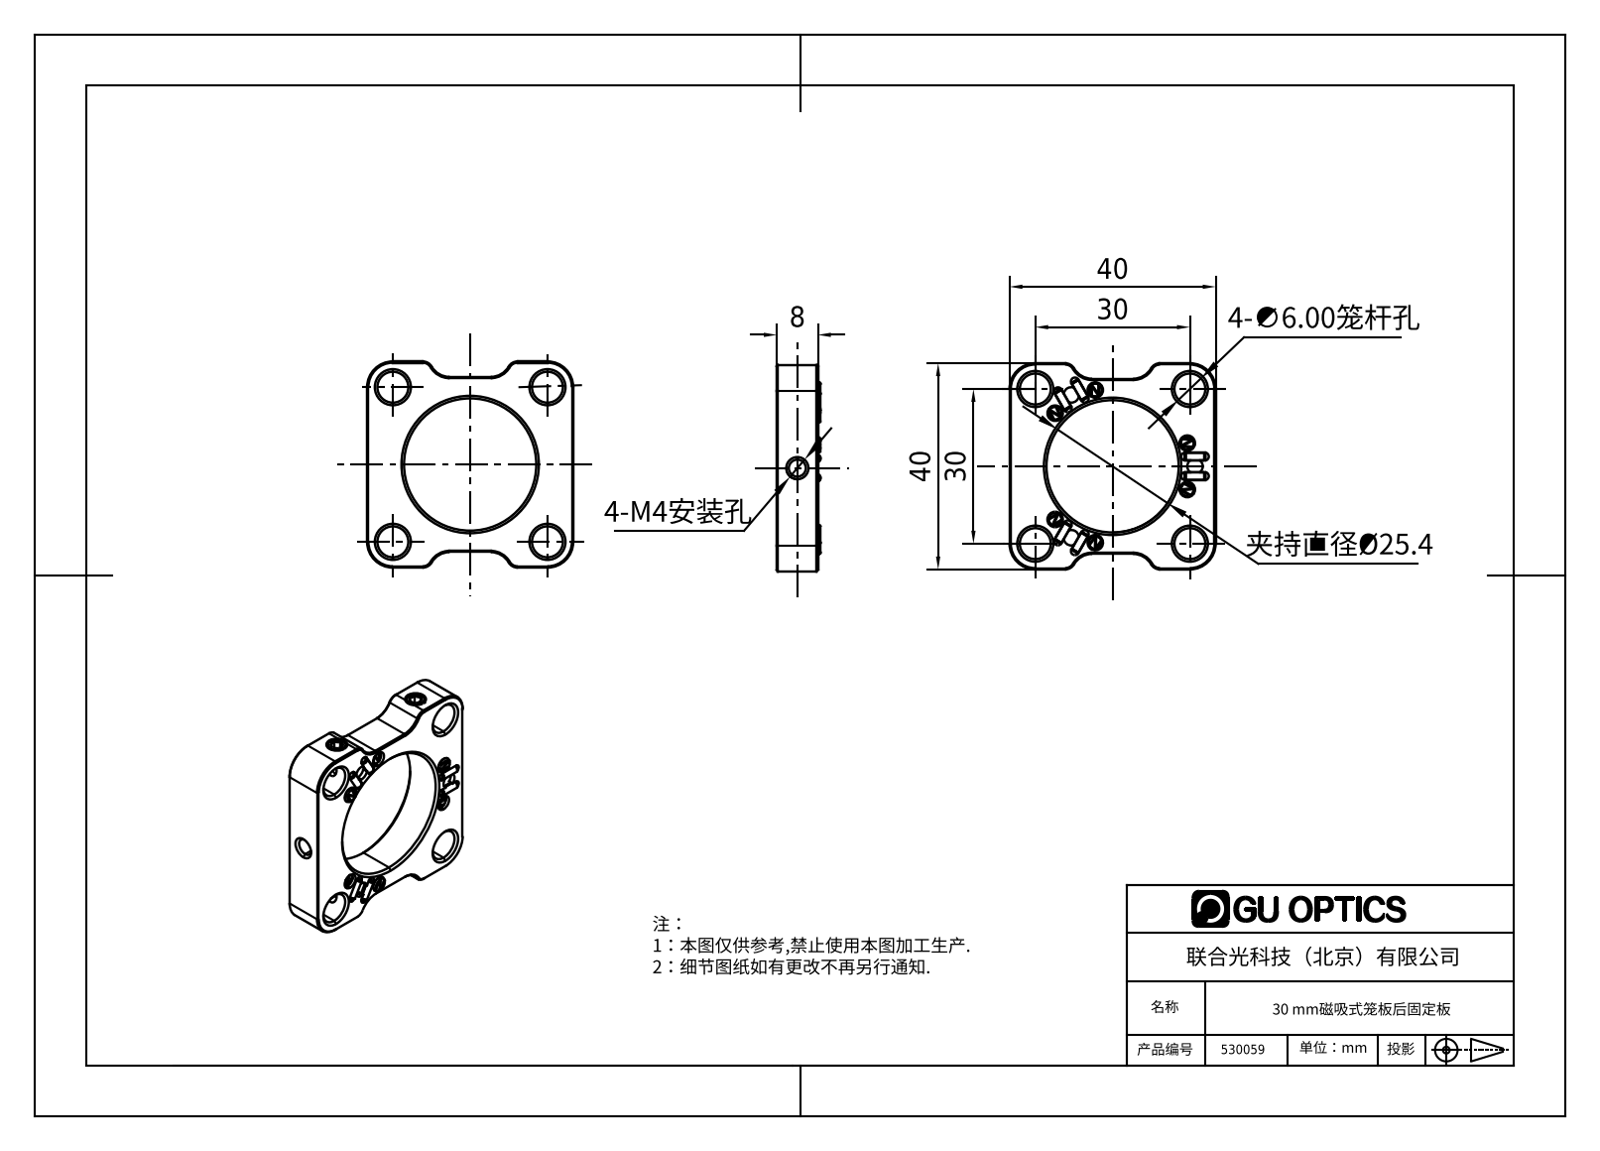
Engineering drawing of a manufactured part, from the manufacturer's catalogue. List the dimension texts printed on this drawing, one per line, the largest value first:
40
40
30
30
夹持直径Ø25.4
8
4-笼杆孔
4-M4安装孔
